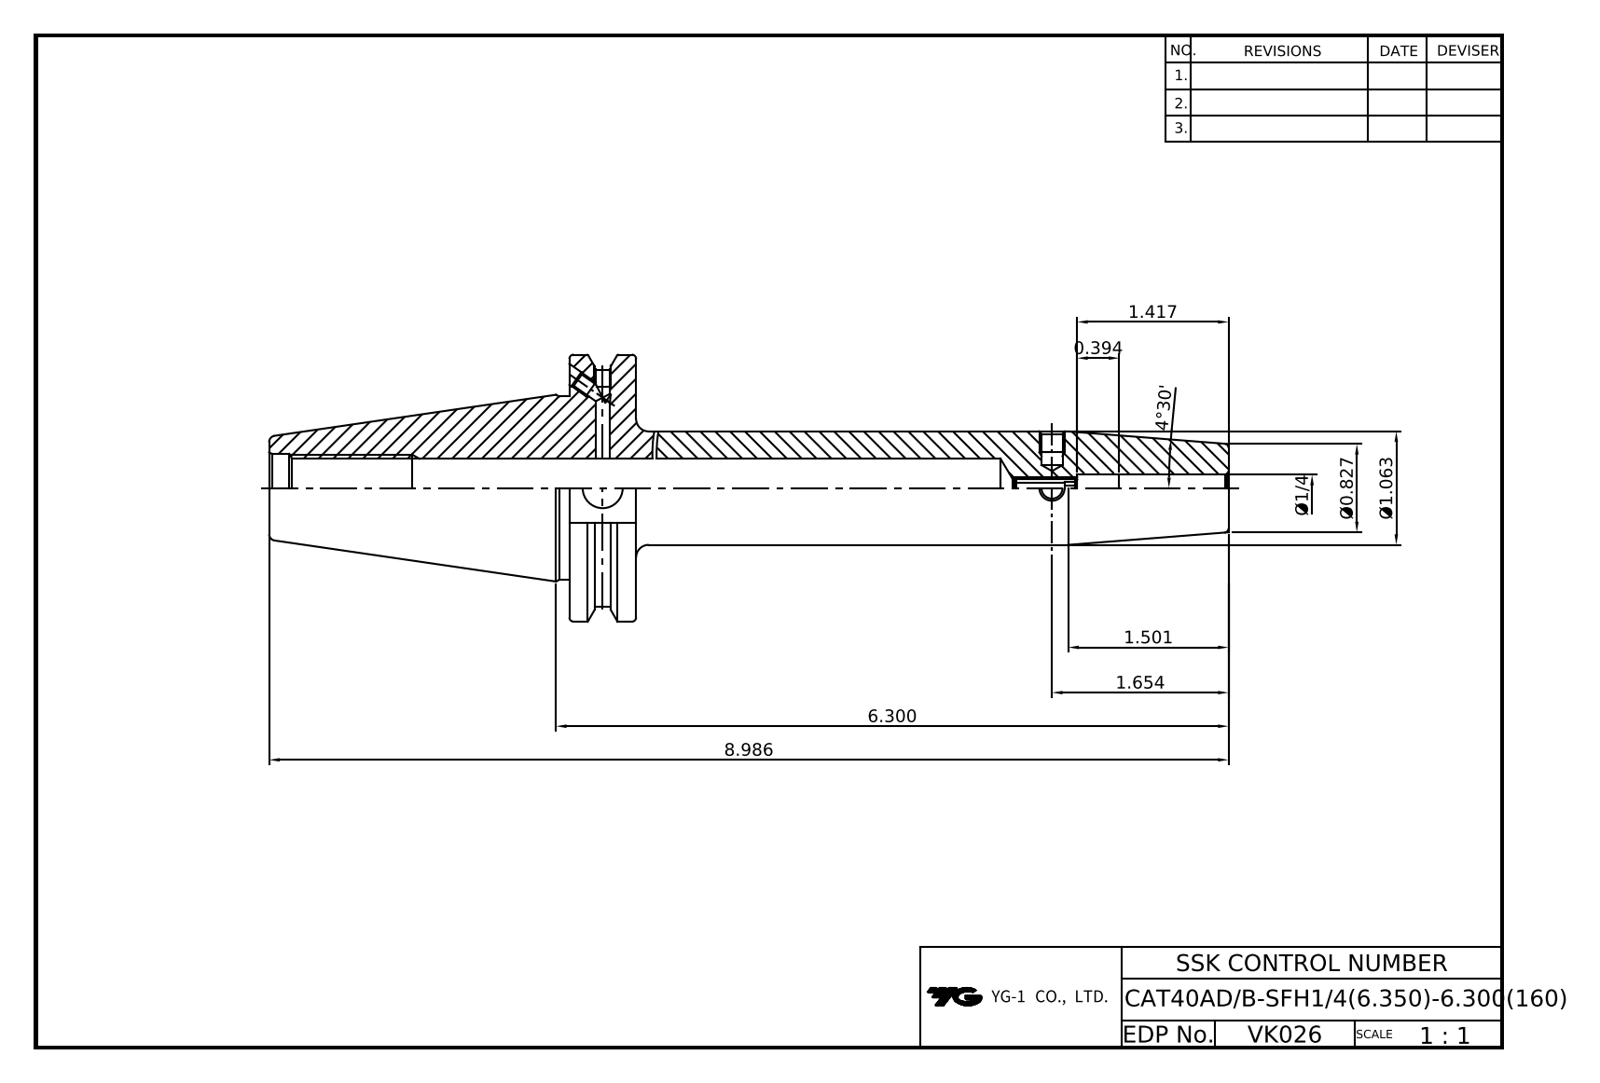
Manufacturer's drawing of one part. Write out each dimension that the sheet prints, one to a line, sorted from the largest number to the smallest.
8.986
6.300
4°30'
1.654
1.501
1.417
Ø1.063
Ø0.827
0.394
